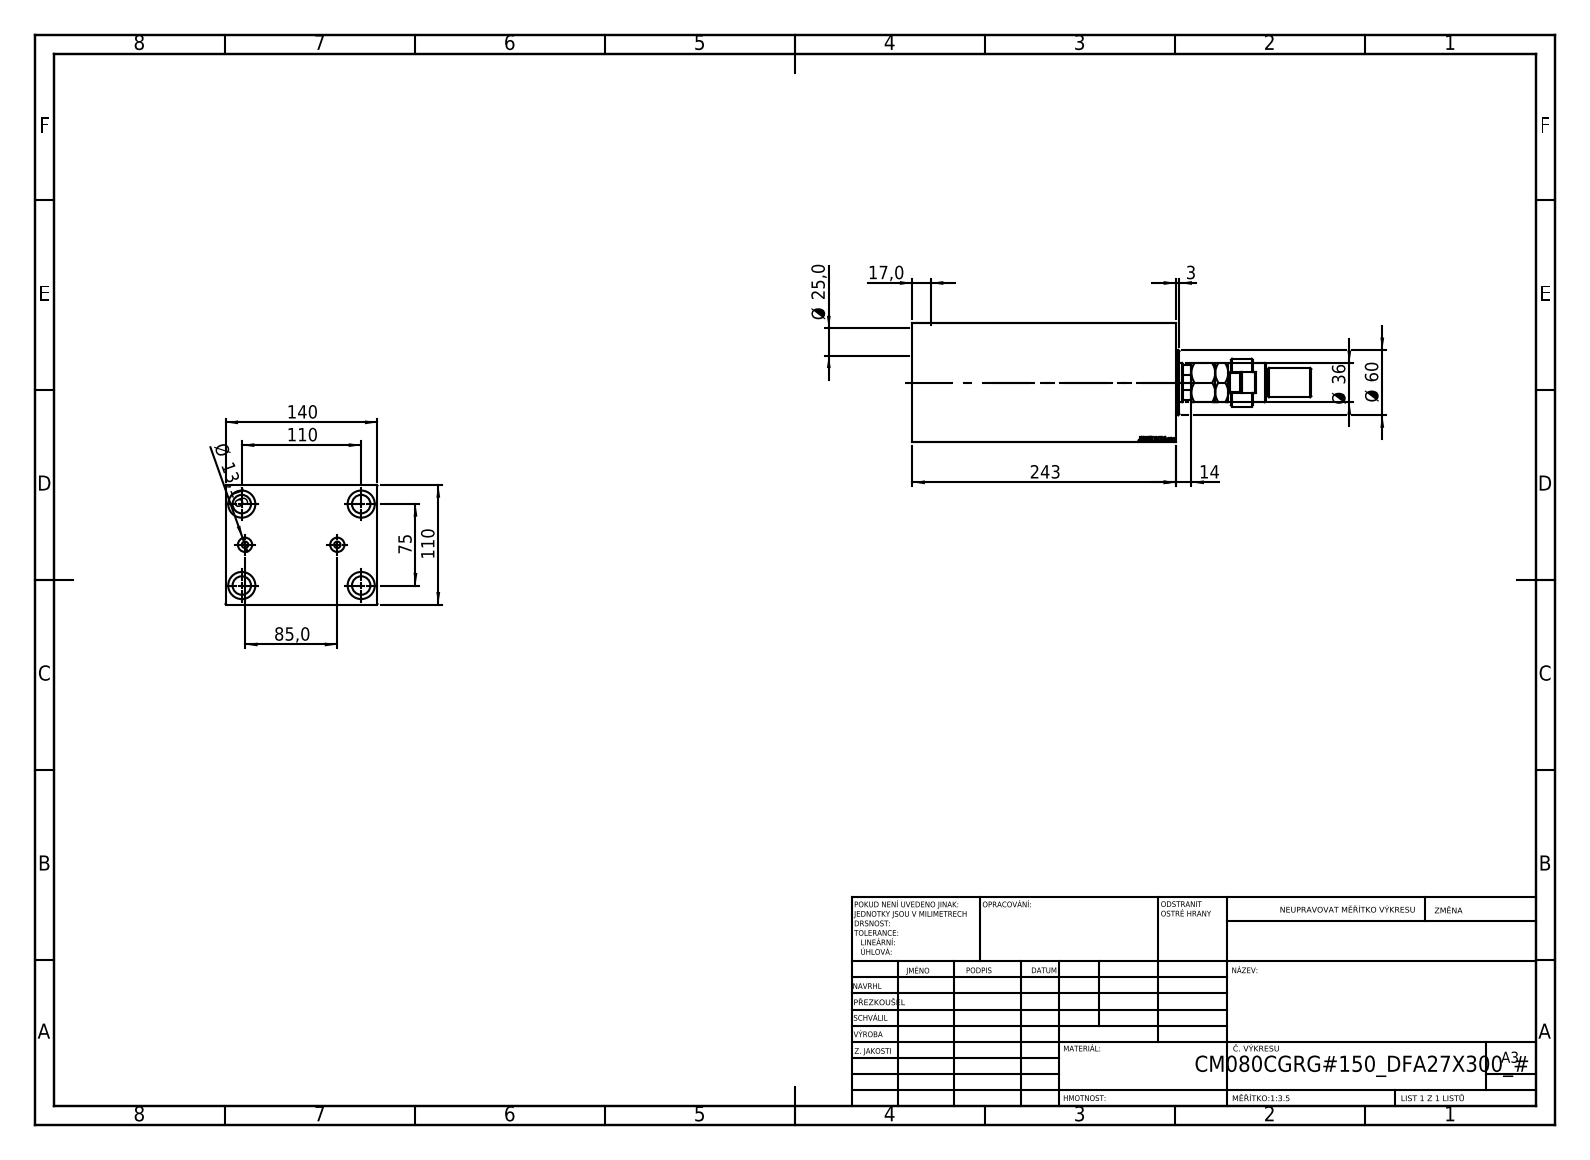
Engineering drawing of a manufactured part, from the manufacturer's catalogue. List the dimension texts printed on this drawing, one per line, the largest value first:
243
140
110
110
85,0
75
Ø 60
Ø 36
Ø 25,0
17,0
14
Ø 13,16
3
